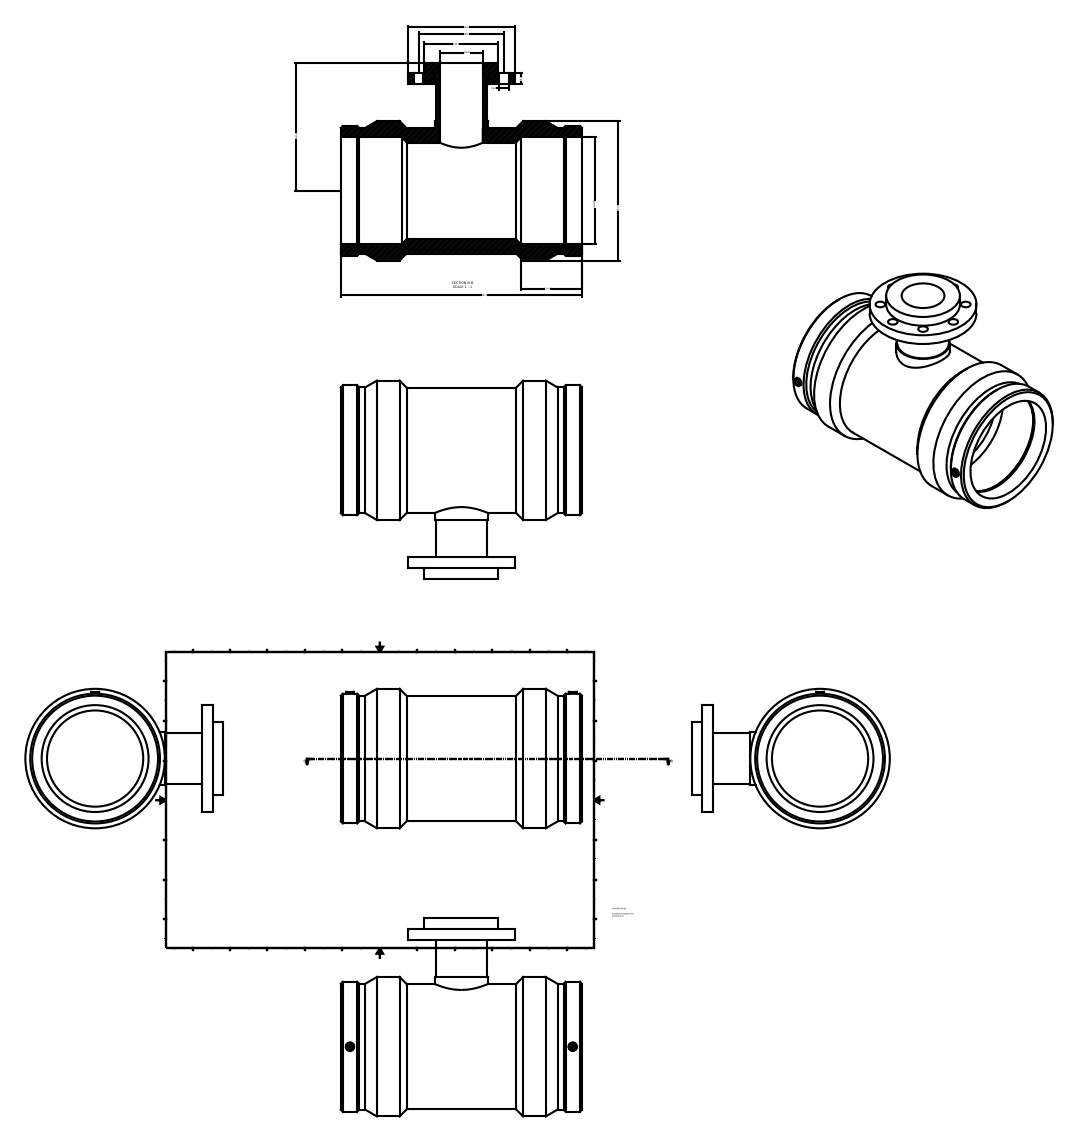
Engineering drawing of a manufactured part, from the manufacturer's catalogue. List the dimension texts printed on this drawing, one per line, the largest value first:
451.00
261.00
240.00
n200.00
200.00
160.00
138.00
114.00
n80.00
20.00
18.00
